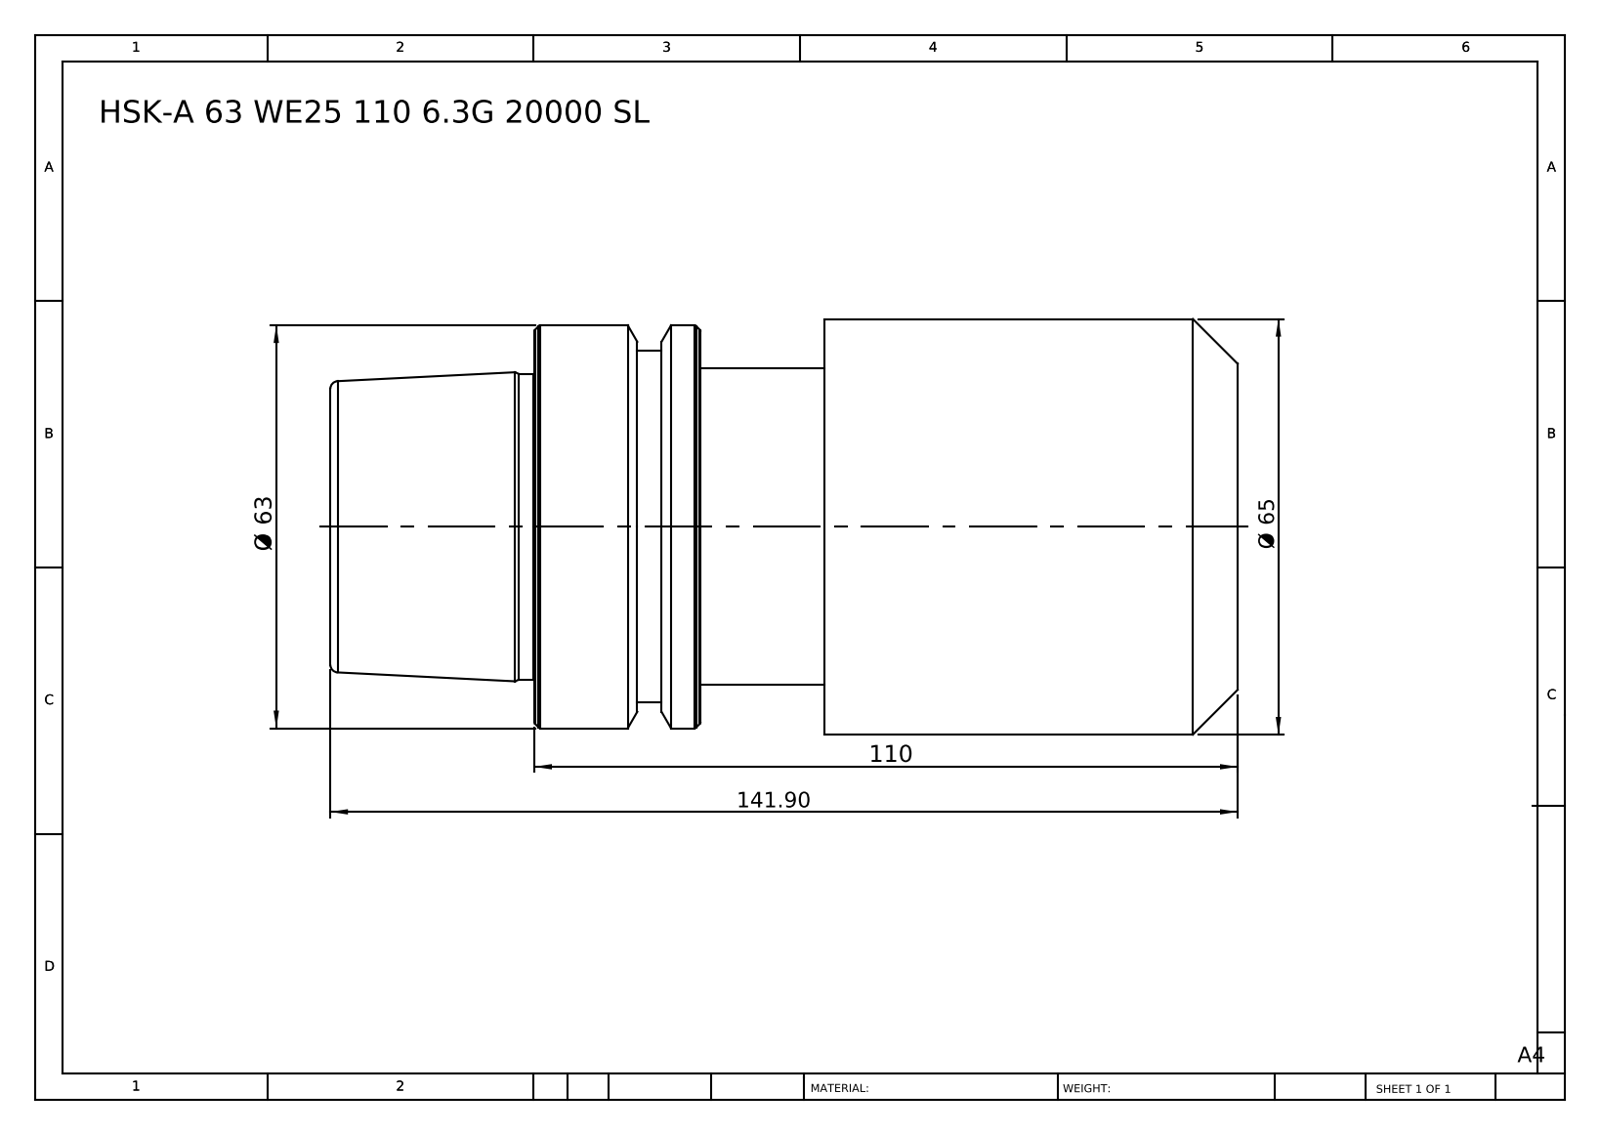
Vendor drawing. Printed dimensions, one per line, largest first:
141.90
110
Ø 65
Ø 63
